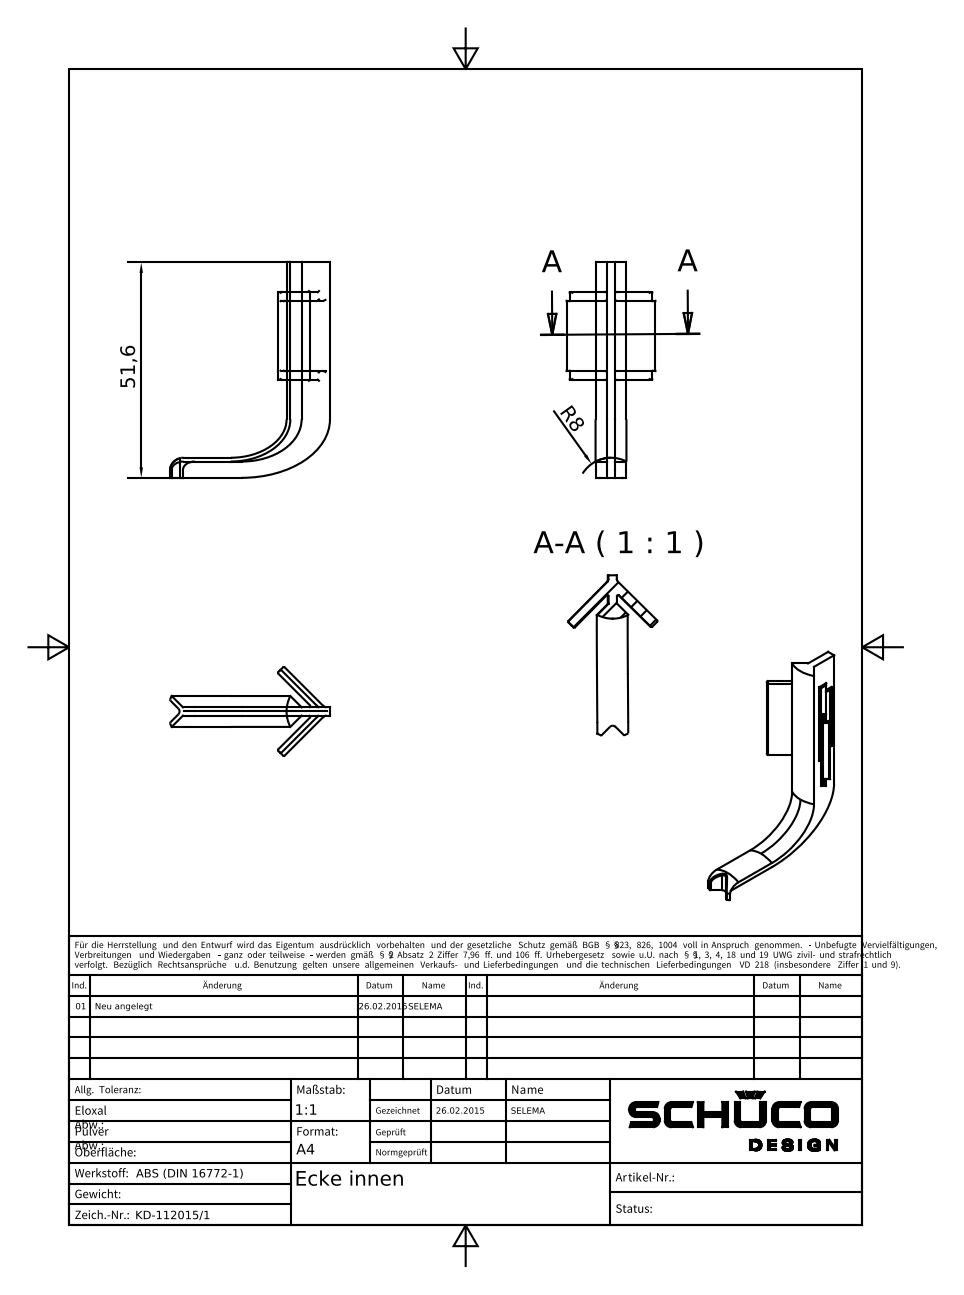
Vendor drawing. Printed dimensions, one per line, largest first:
51,6
R8
